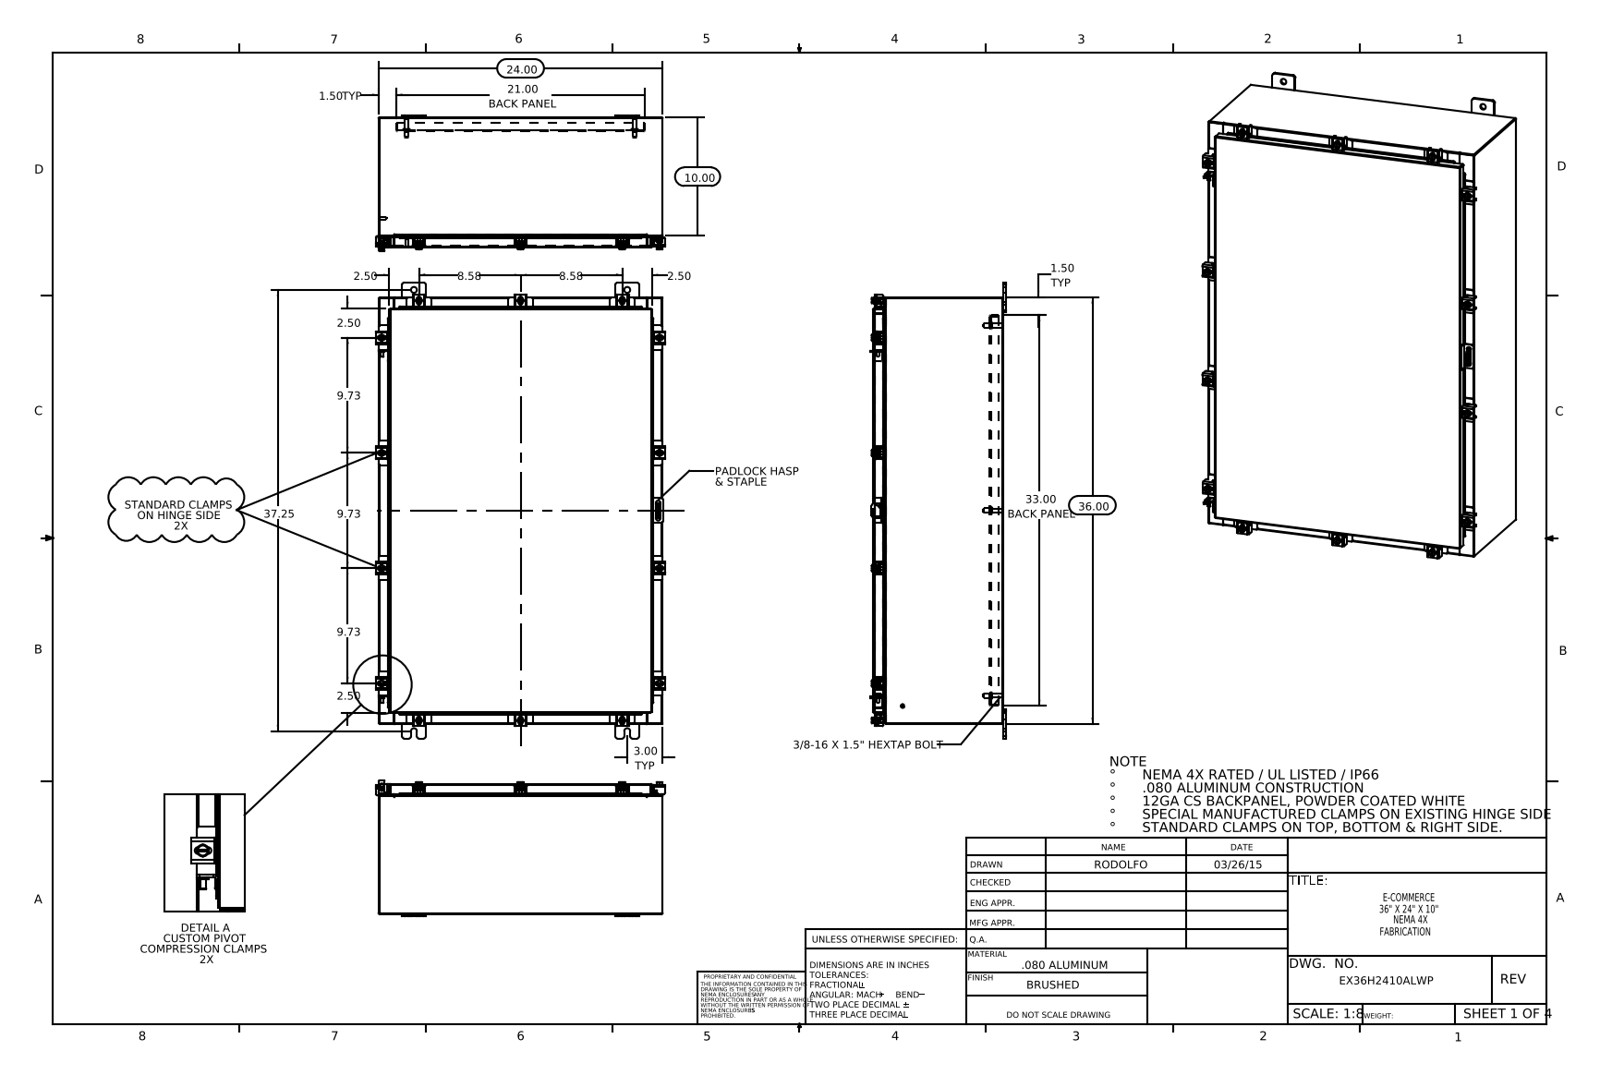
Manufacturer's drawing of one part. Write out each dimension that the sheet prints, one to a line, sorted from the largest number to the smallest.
37.25
36.00
33.00 BACK PANEL
24.00
21.00 BACK PANEL
10.00
9.73
9.73
9.73
8.58
8.58
3.00 TYP
2.50
2.50
2.50
2.50
1.50 TYP
1.50 TYP
